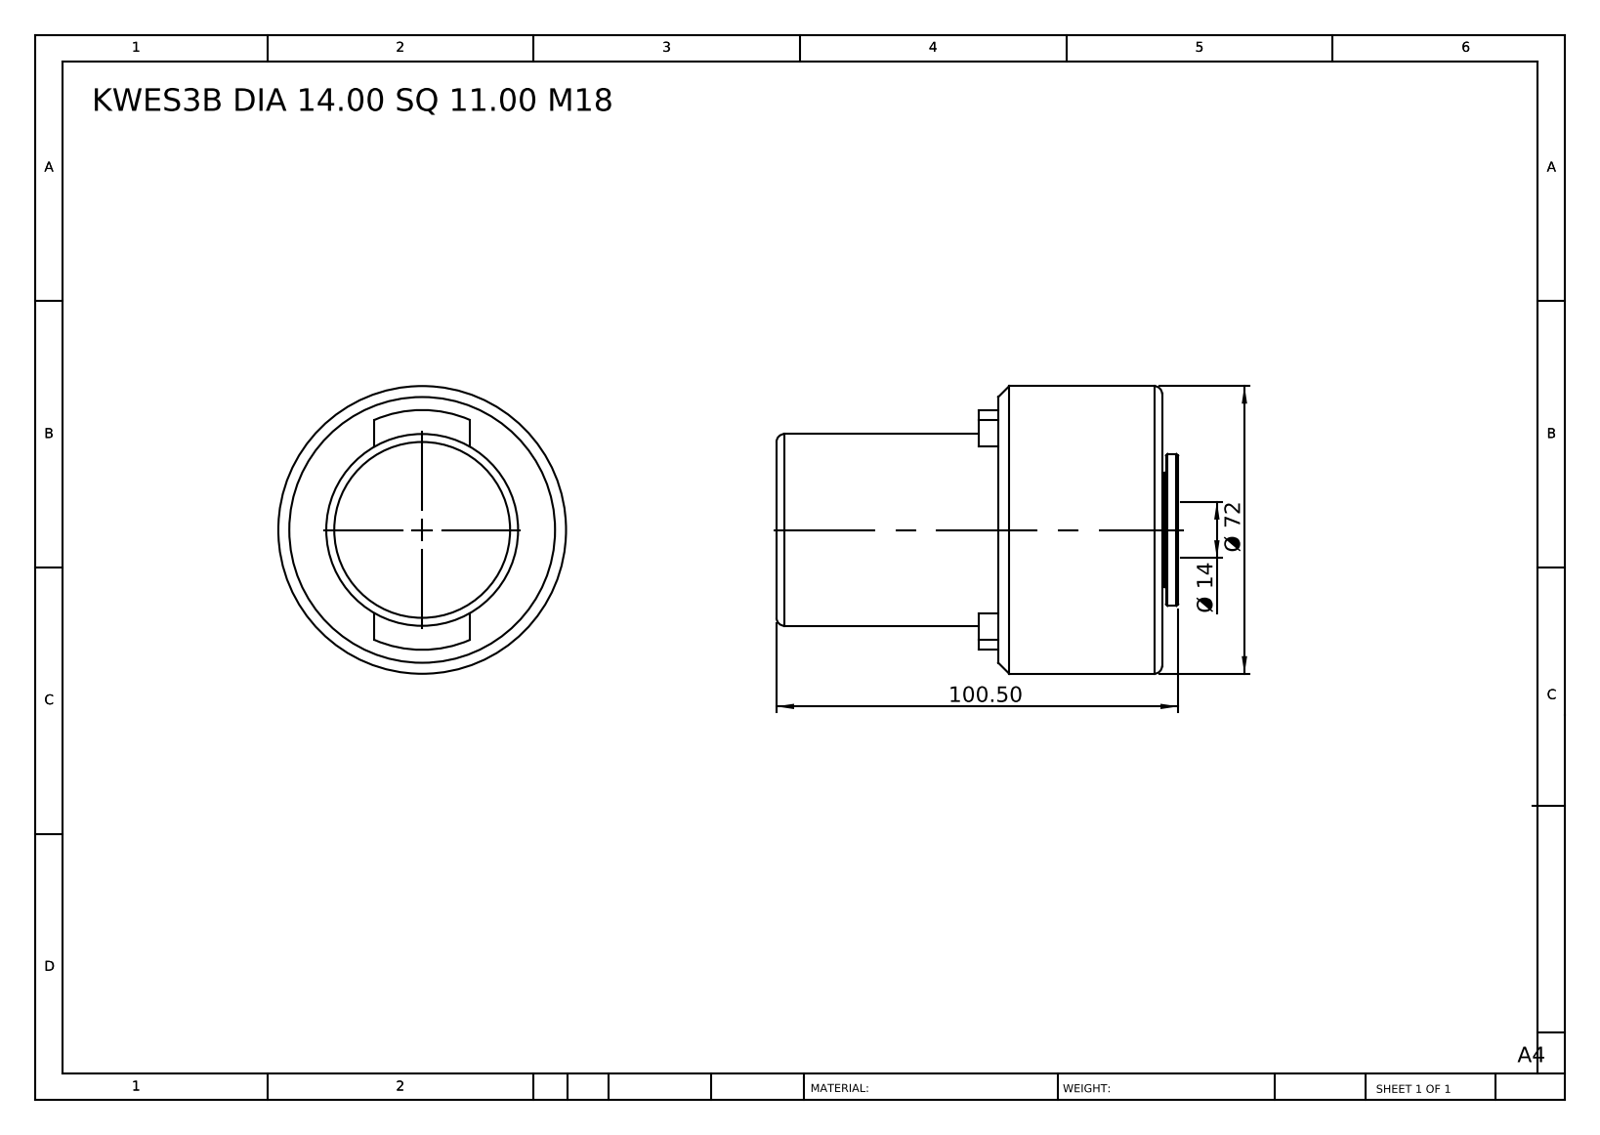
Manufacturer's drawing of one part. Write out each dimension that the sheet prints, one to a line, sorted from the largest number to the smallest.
100.50
Ø 72
Ø 14
